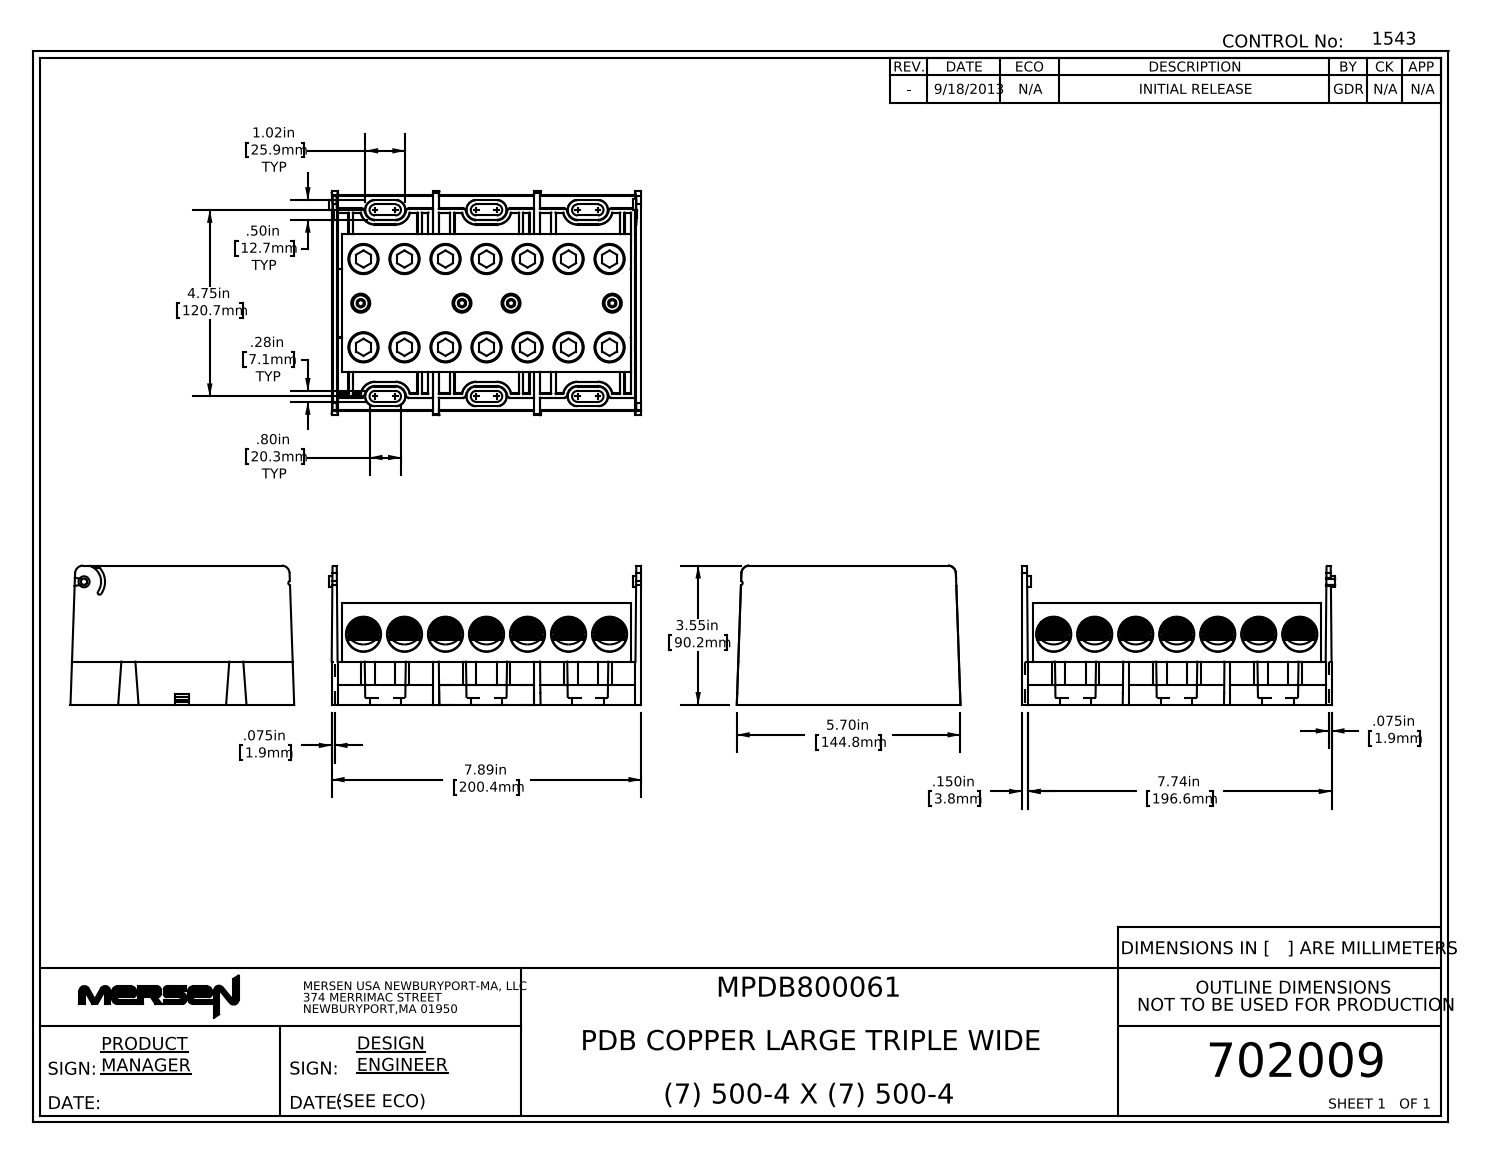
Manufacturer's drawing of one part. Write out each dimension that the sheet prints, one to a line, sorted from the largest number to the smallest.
7.89in 200.4mm
7.74in 196.6mm
5.70in 144.8mm
4.75in 120.7mm
3.55in 90.2mm
1.02in 25.9mm TYP
.80in 20.3mm TYP
.50in 12.7mm TYP
.28in 7.1mm TYP
.150in 3.8mm
.075in 1.9mm
.075in 1.9mm
